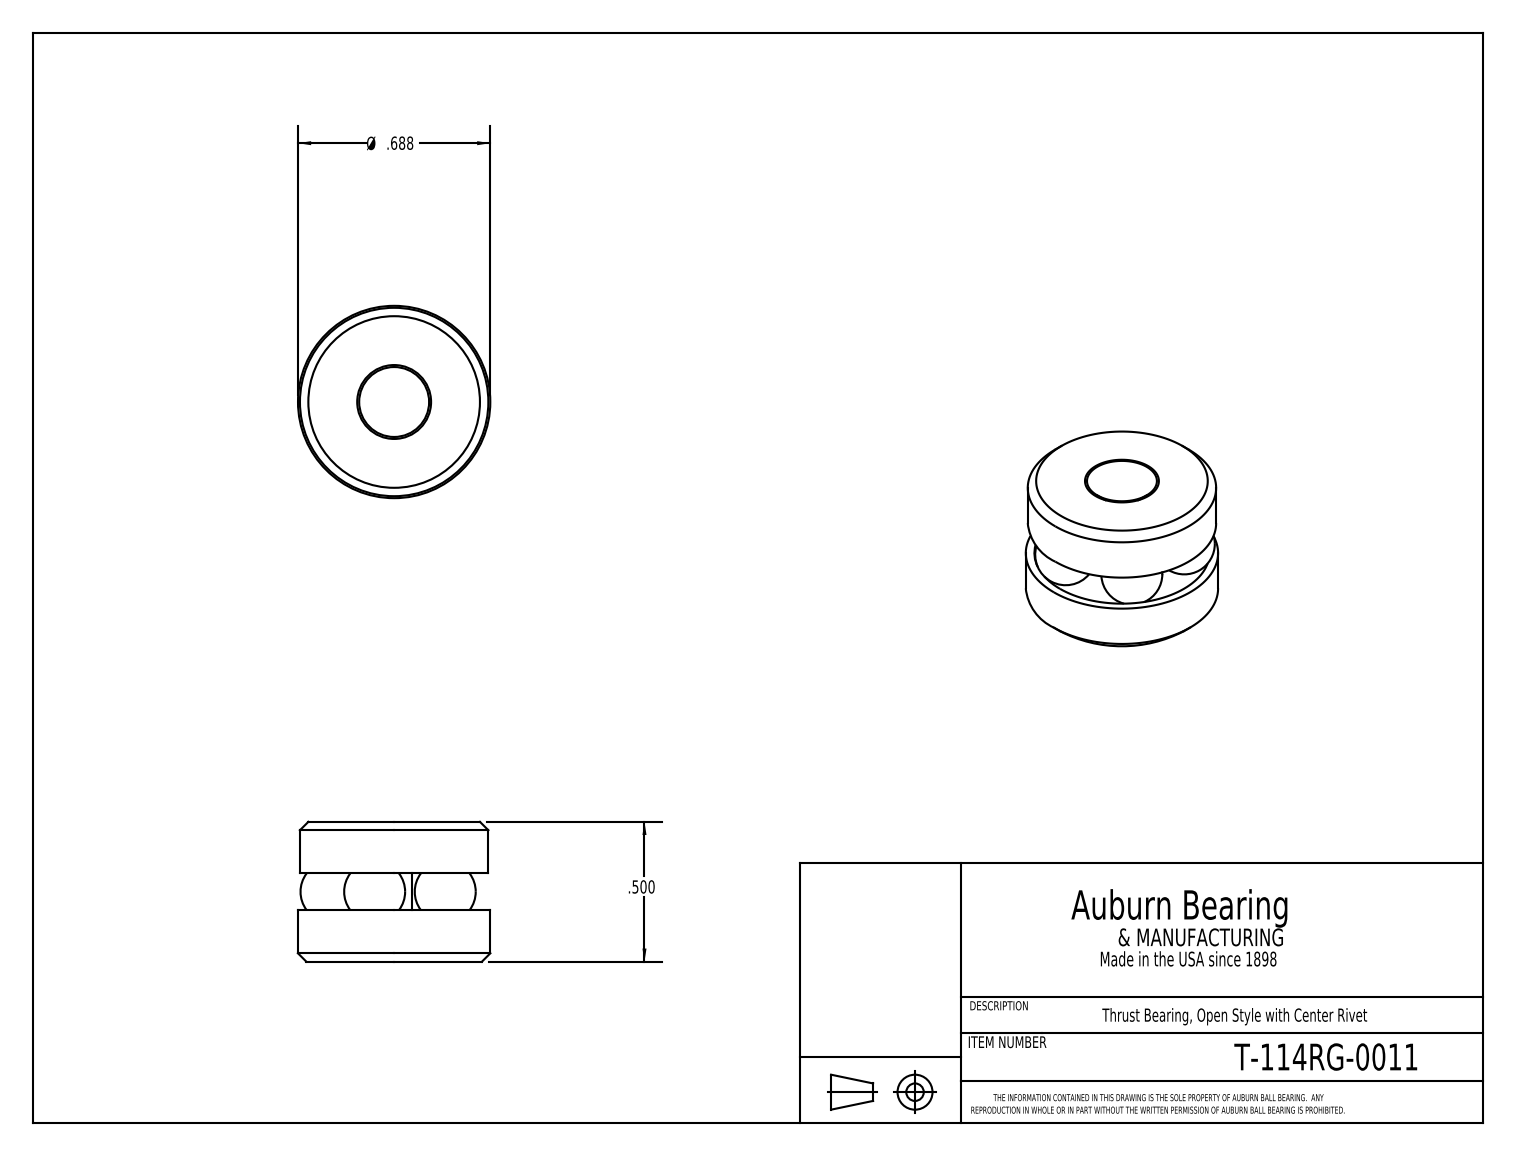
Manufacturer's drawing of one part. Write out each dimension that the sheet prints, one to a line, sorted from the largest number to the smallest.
Ø .688
.500
